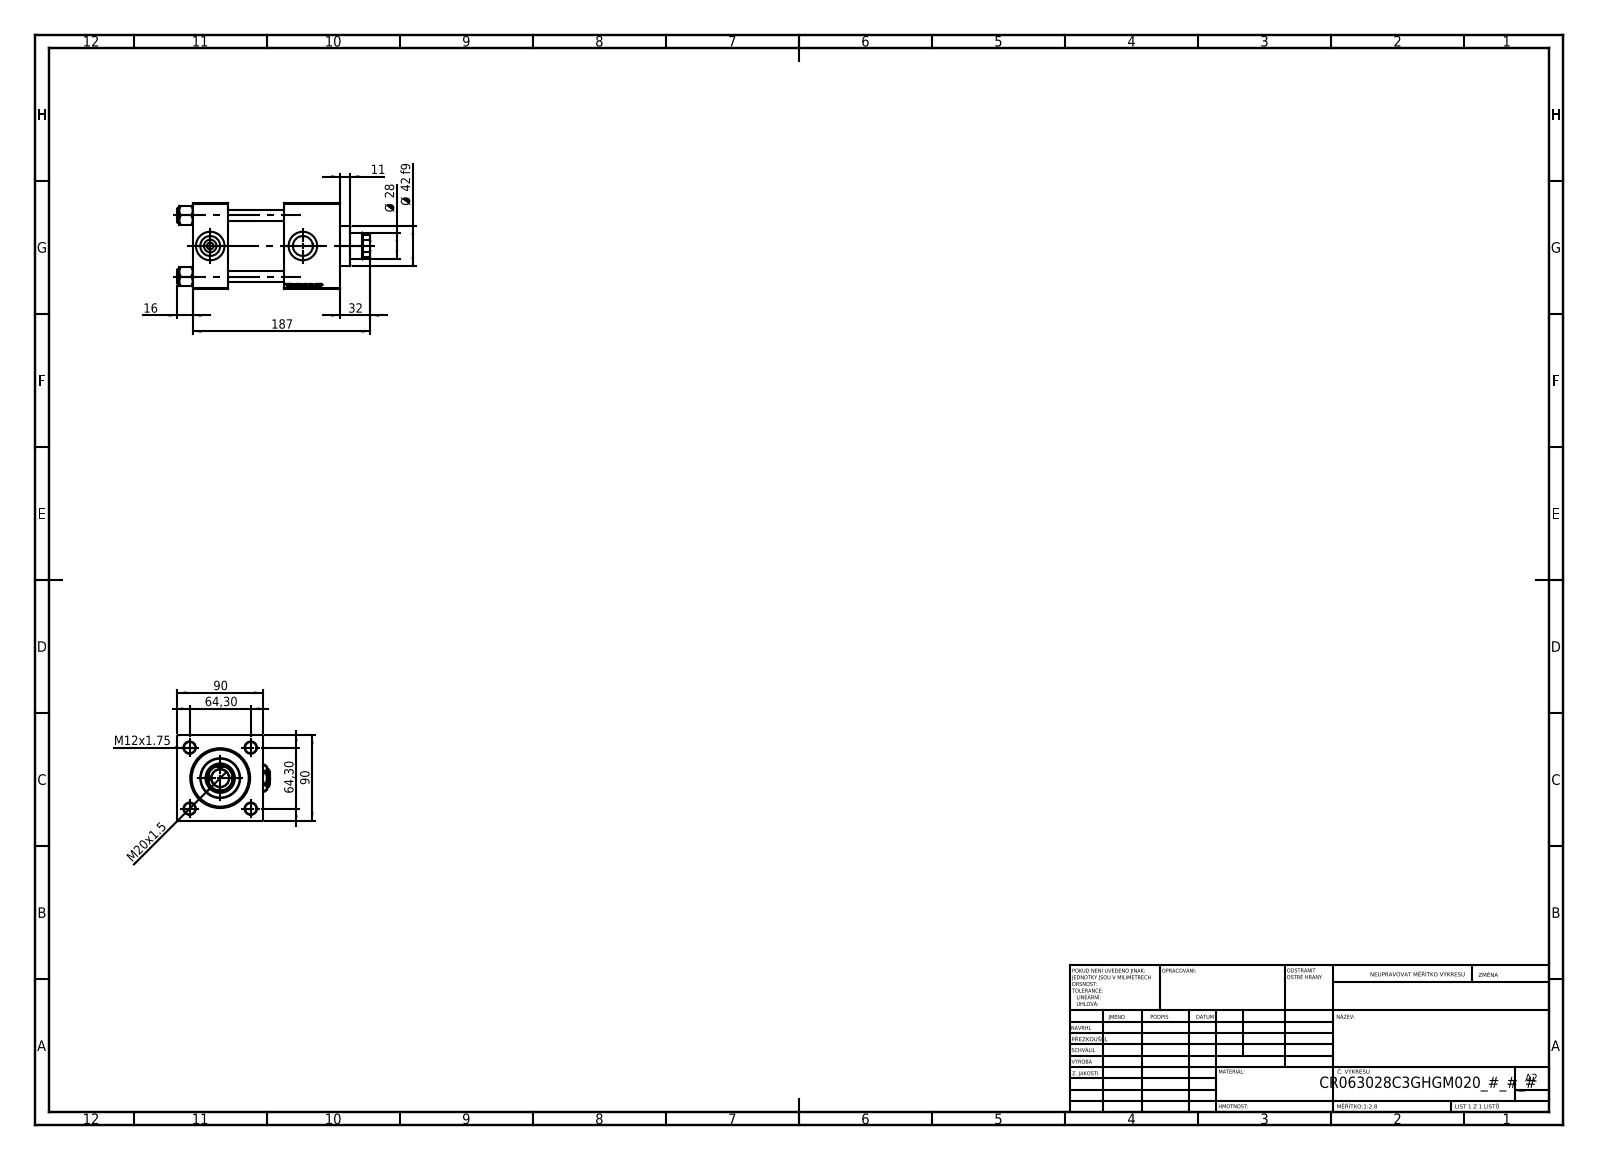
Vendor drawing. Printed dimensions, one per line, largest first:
187
90
90
64,30
64,30
Ø 42 f9
32
Ø 28
M20x1.5
16
M12x1.75
11
